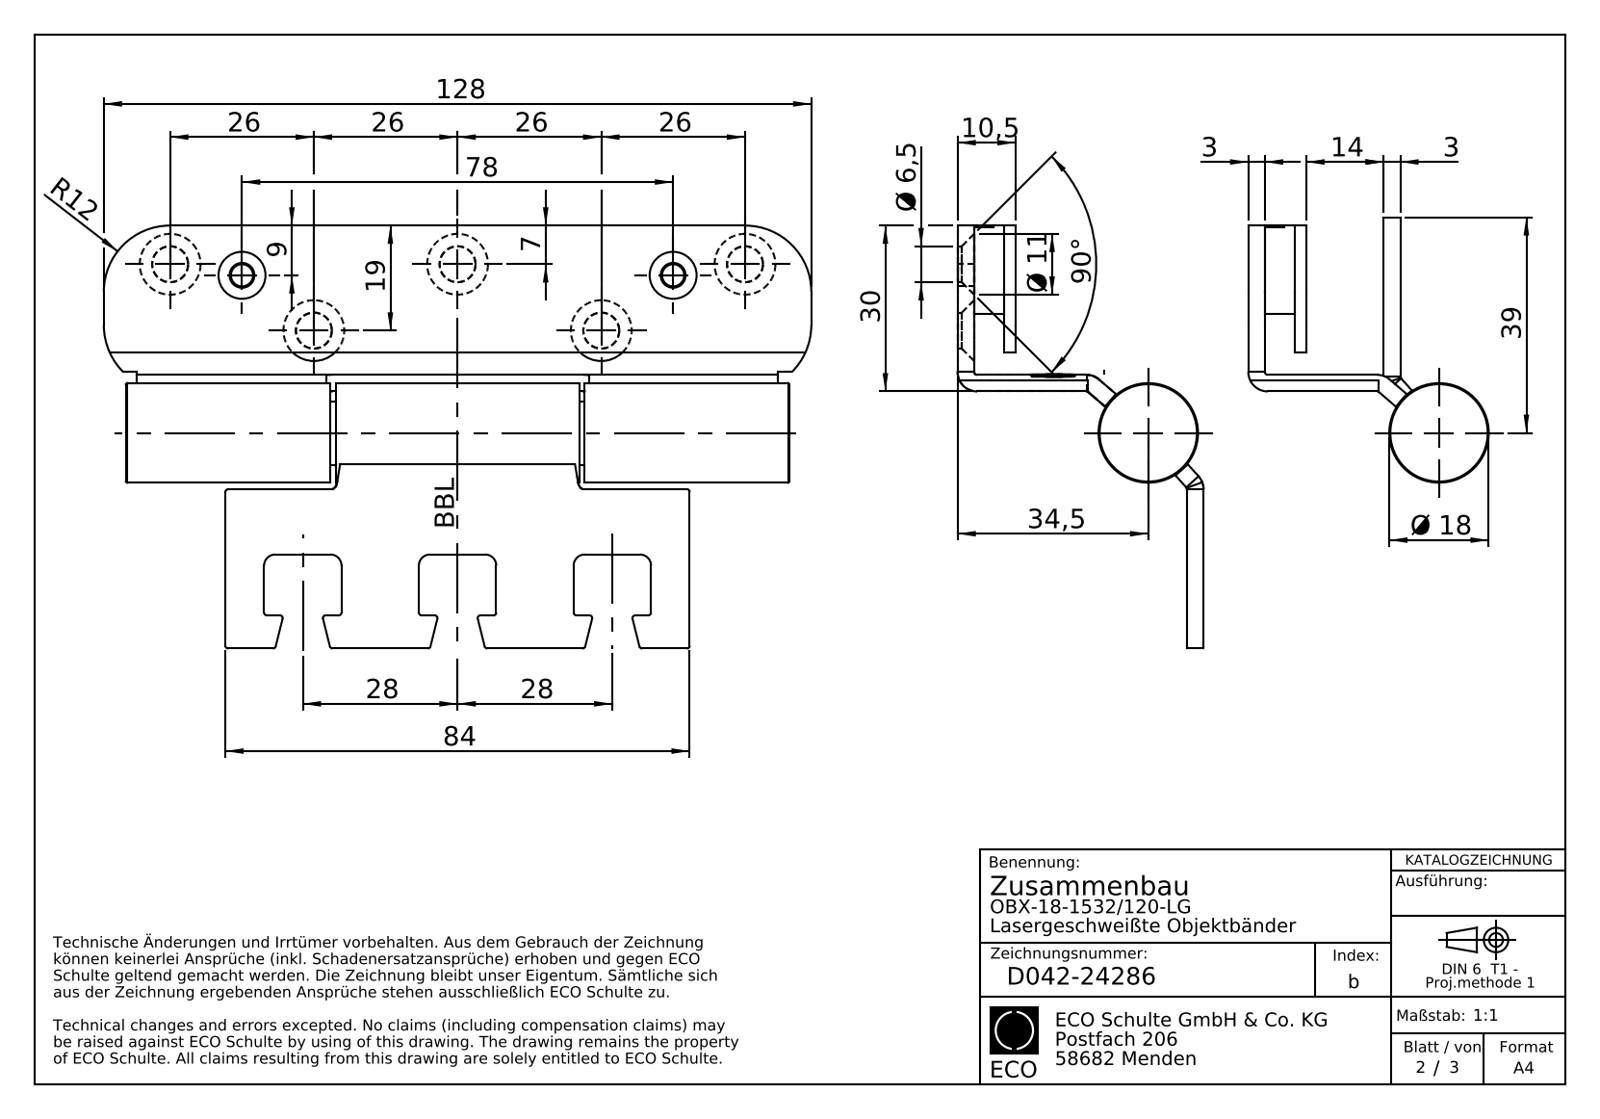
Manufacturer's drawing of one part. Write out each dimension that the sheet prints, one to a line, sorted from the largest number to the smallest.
128
90°
84
78
39
34,5
30
28
28
26
26
26
26
19
Ø 18
14
R12
Ø 11
10,5
9
7
Ø 6,5
3
3
